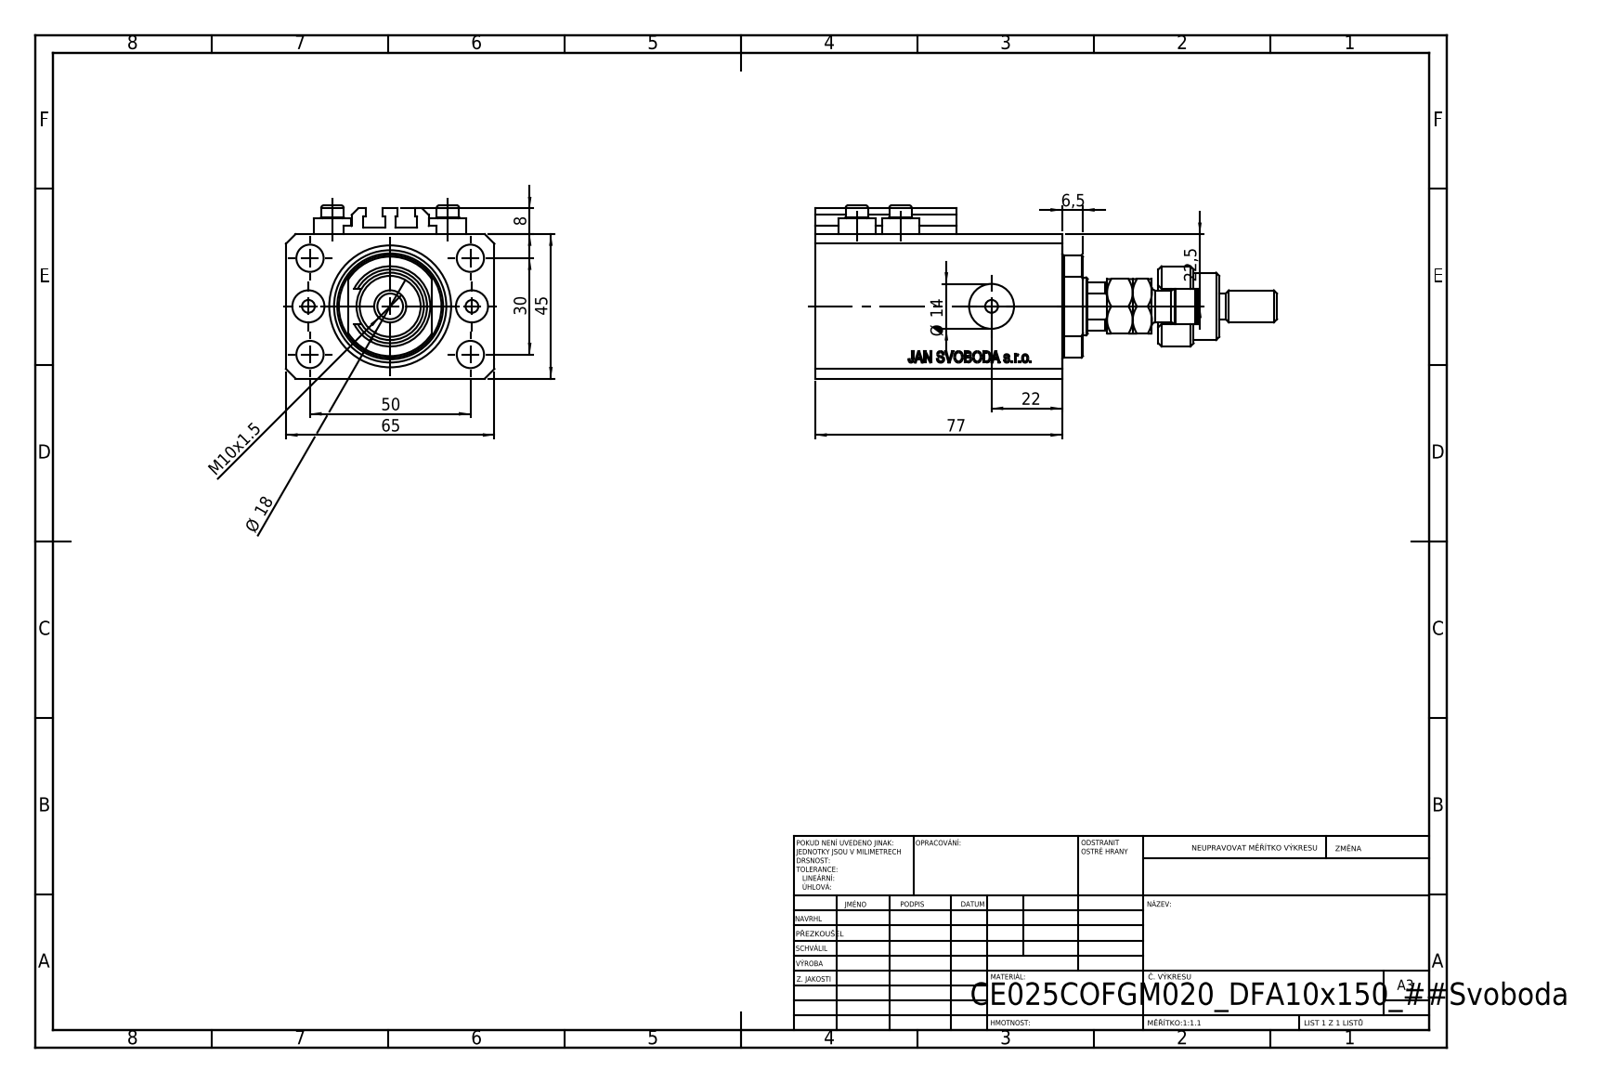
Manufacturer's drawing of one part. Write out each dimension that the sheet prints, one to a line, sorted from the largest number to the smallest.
77
65
50
45
30
22,5
22
Ø 18
Ø 14
M10x1.5
8
6,5
